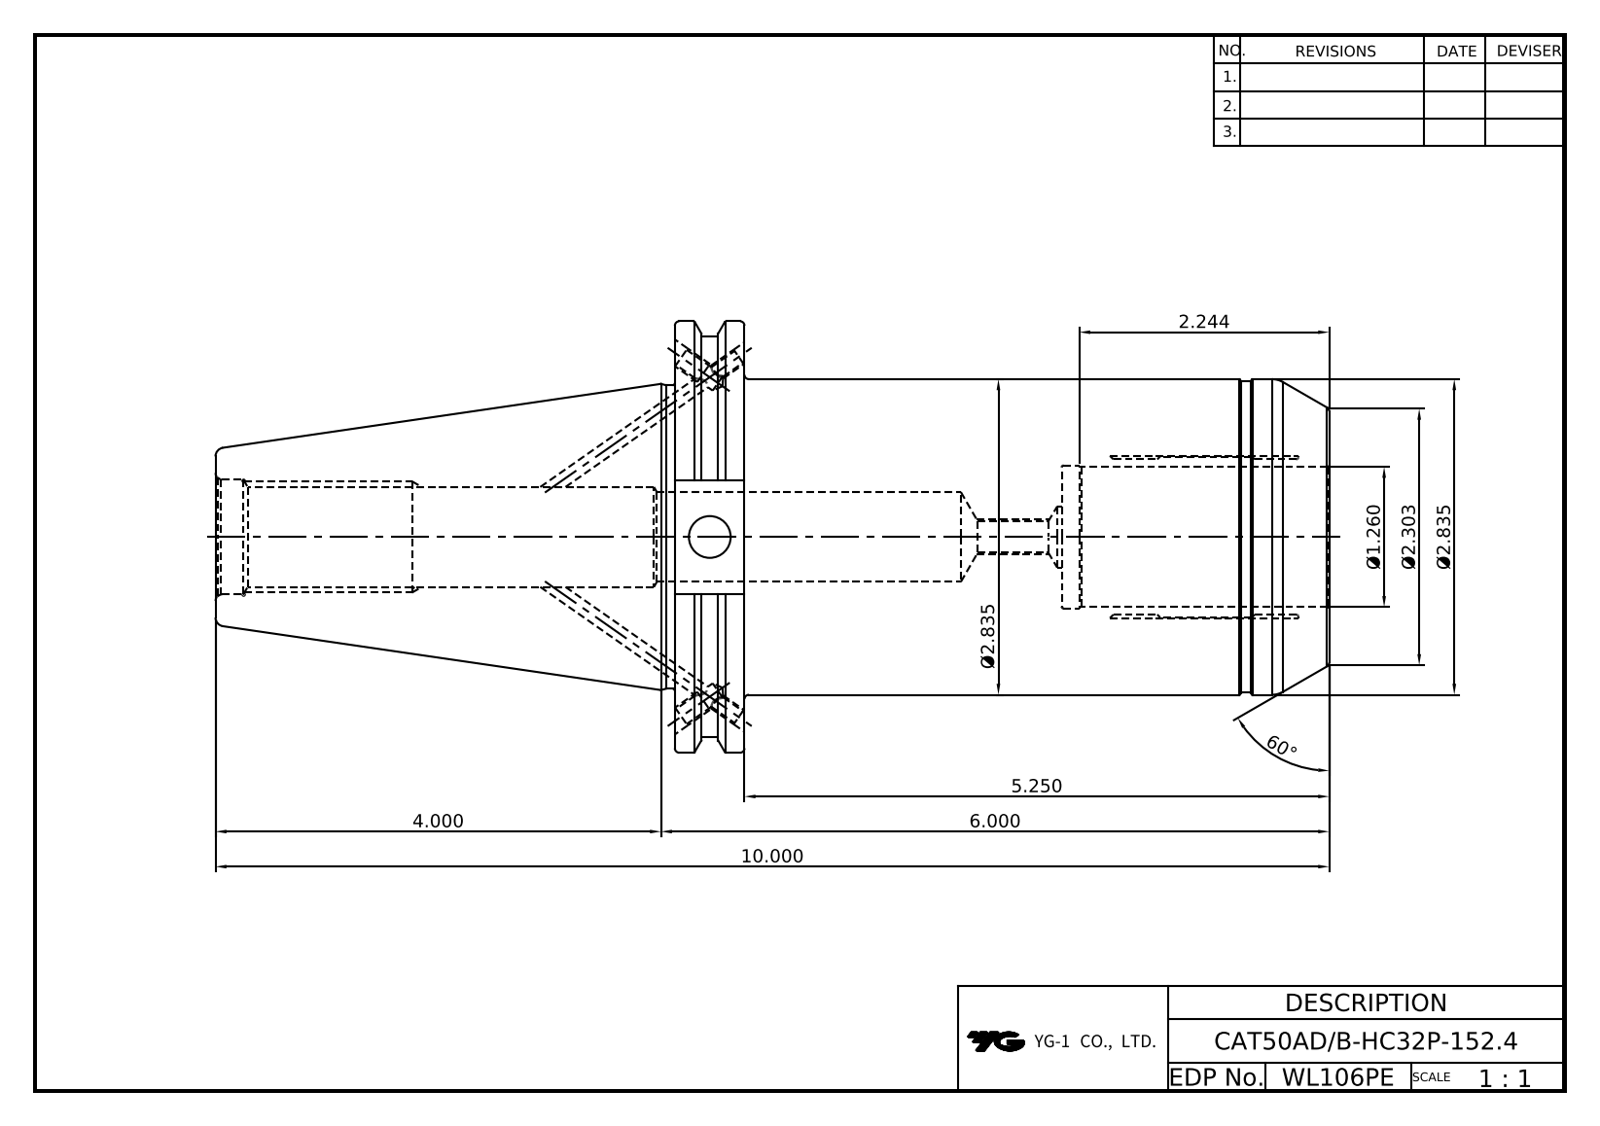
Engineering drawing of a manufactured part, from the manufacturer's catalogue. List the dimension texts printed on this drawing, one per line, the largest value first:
60°
10.000
6.000
5.250
4.000
Ø2.835
Ø2.835
Ø2.303
2.244
Ø1.260
